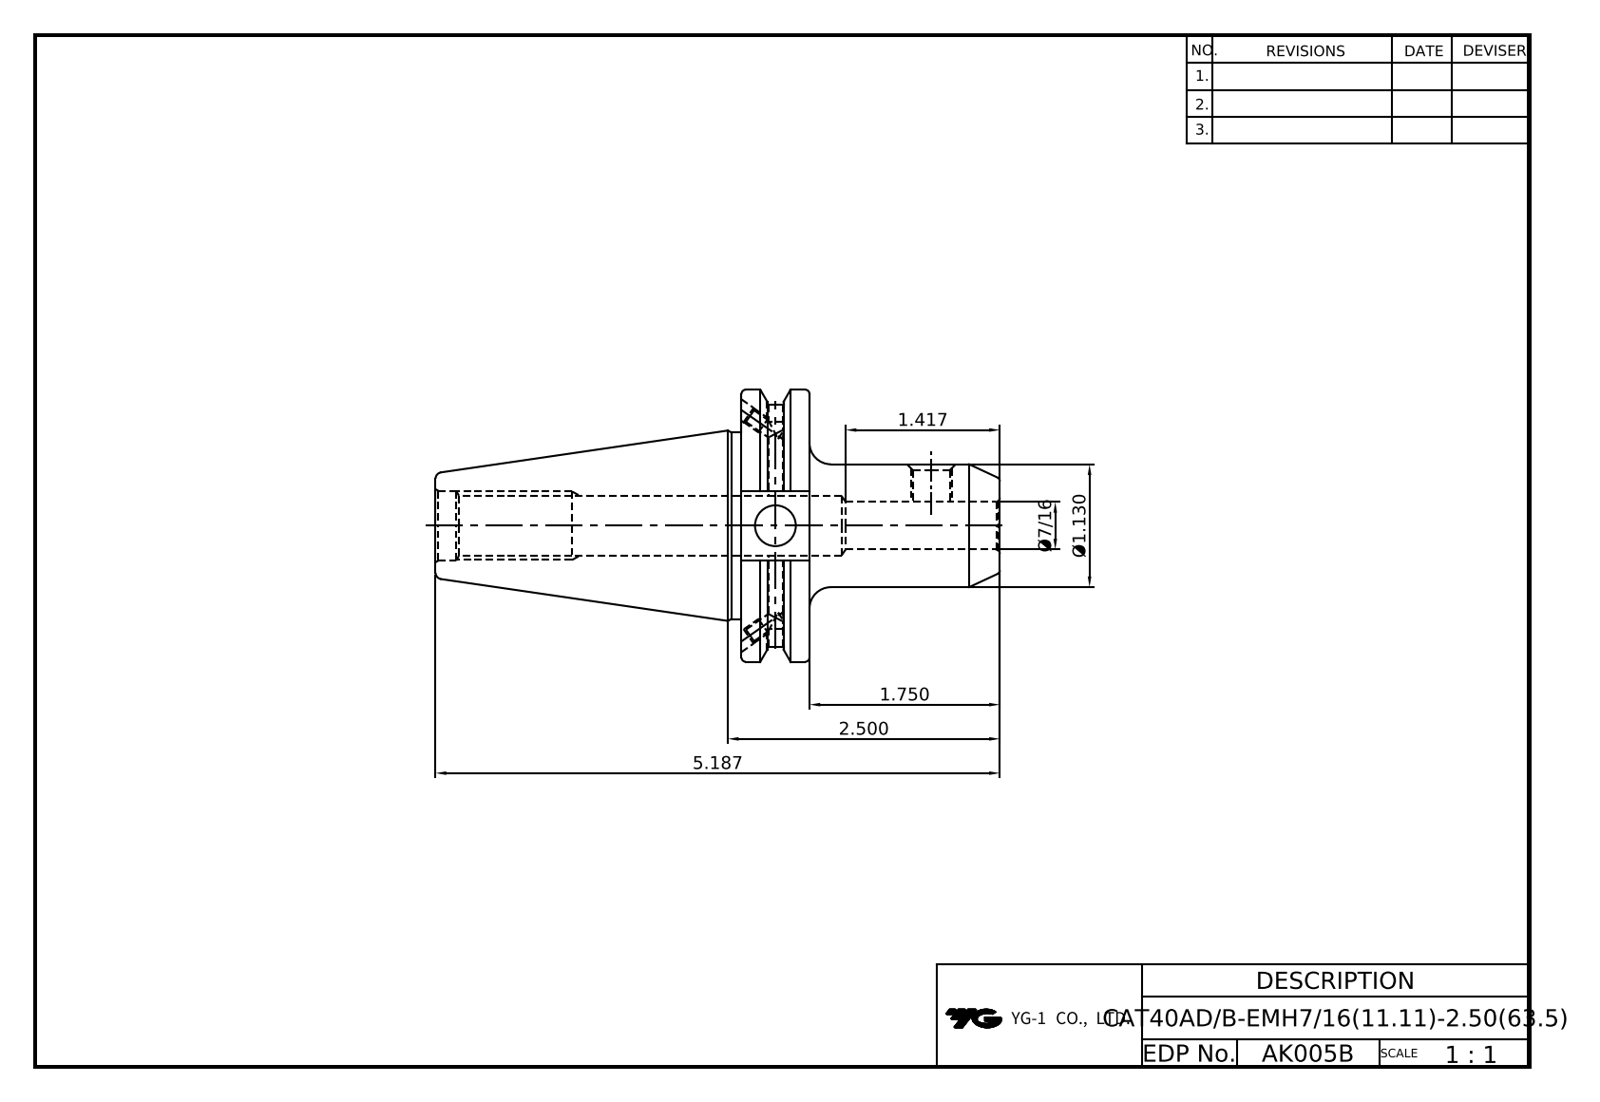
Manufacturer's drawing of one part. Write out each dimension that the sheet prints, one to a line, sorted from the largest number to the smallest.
5.187
2.500
1.750
1.417
Ø1.130
Ø7/16
